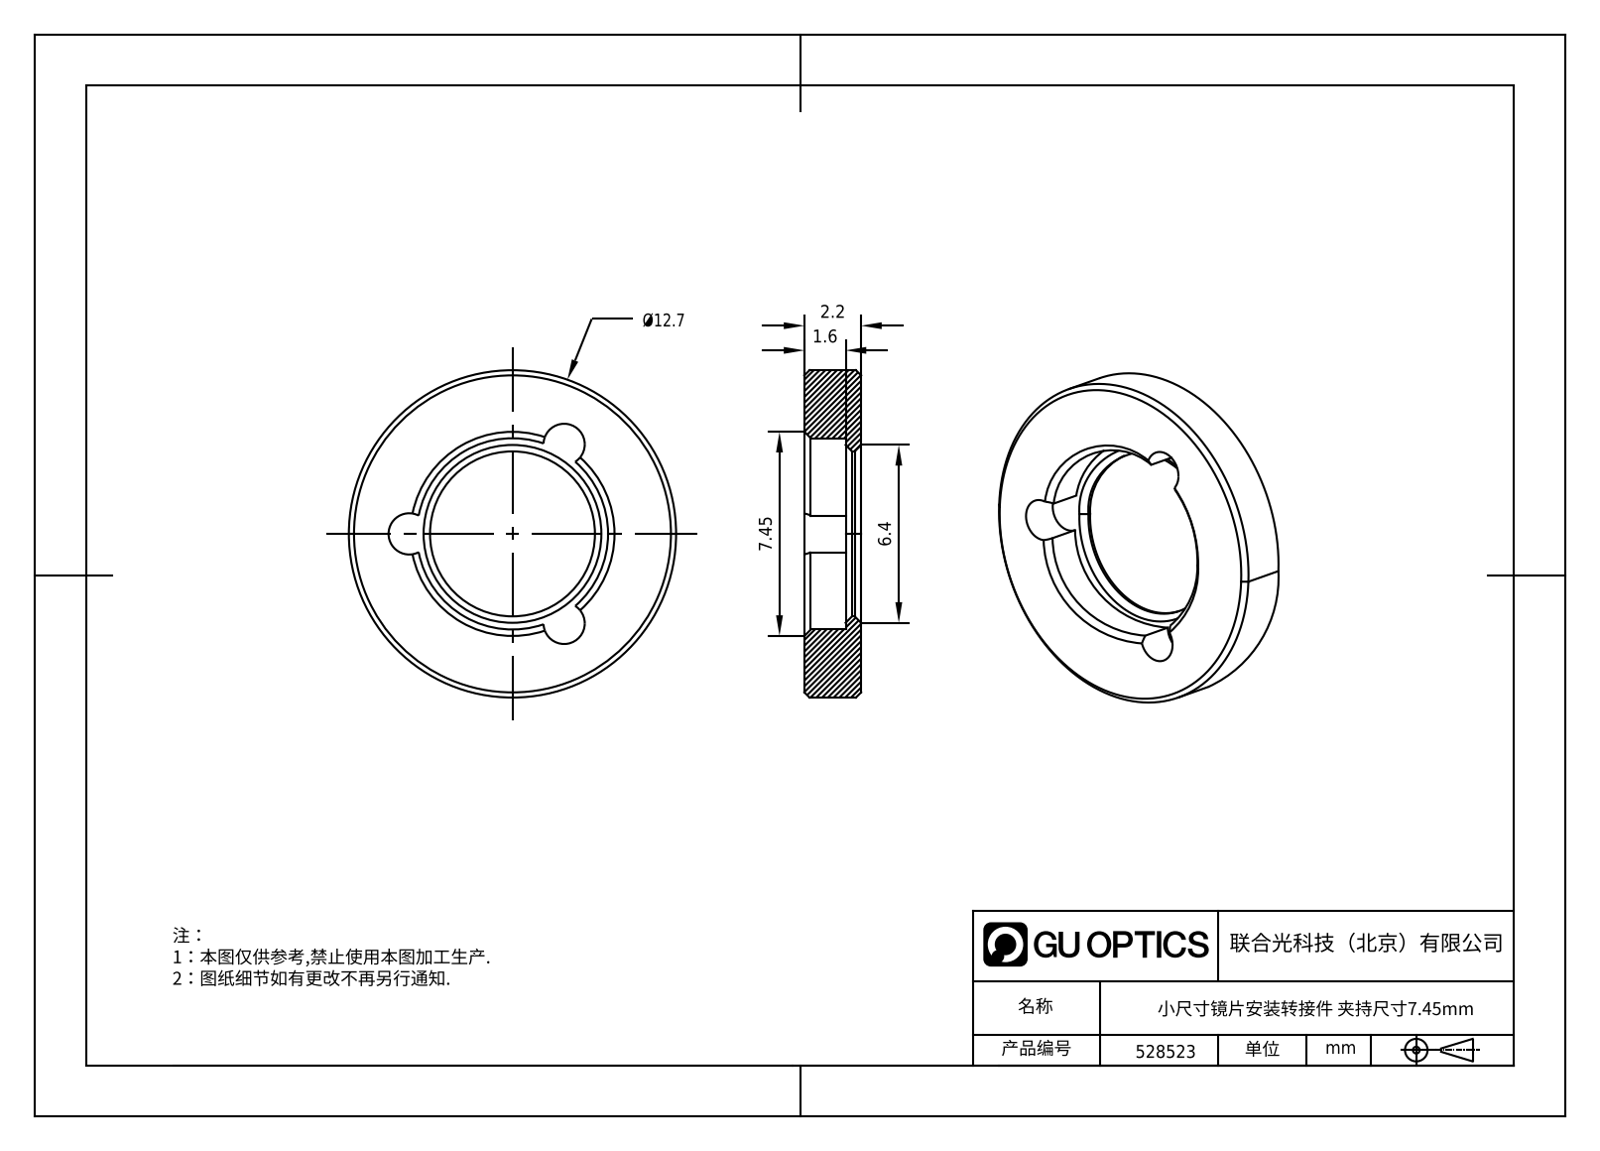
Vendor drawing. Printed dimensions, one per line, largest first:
7.45
6.4
2.2
1.6
